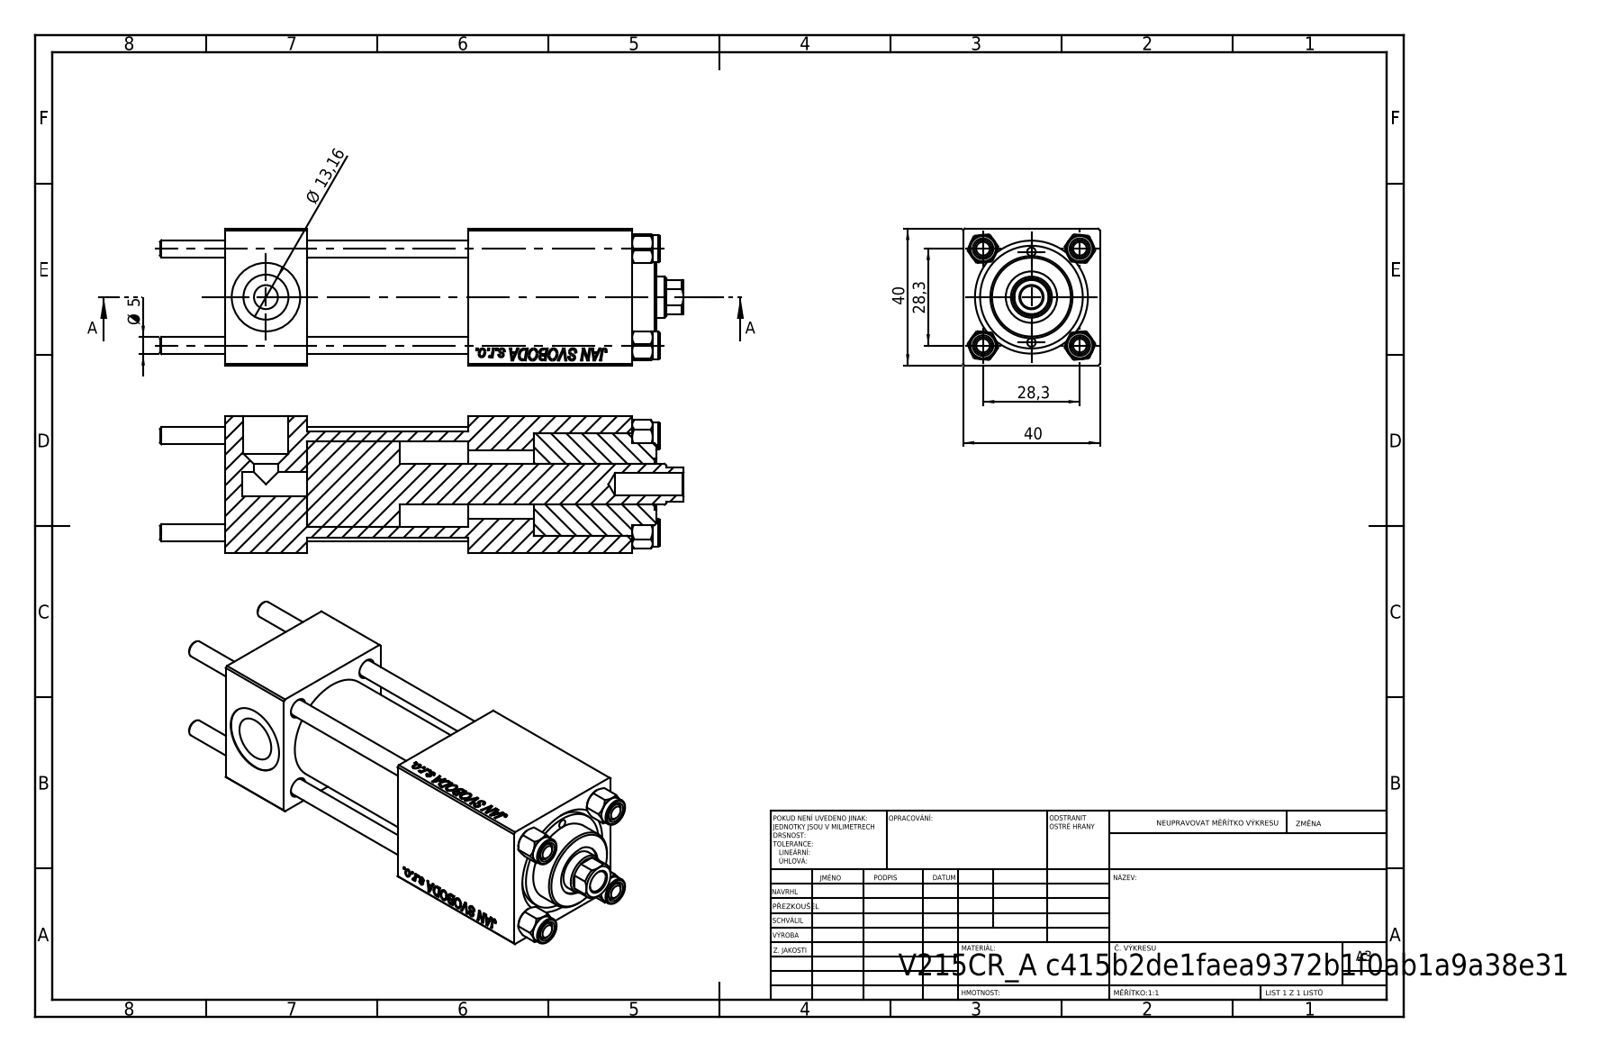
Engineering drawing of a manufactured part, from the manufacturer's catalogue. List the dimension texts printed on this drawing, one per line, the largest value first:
40
40
28,3
28,3
Ø 13,16
Ø 5
